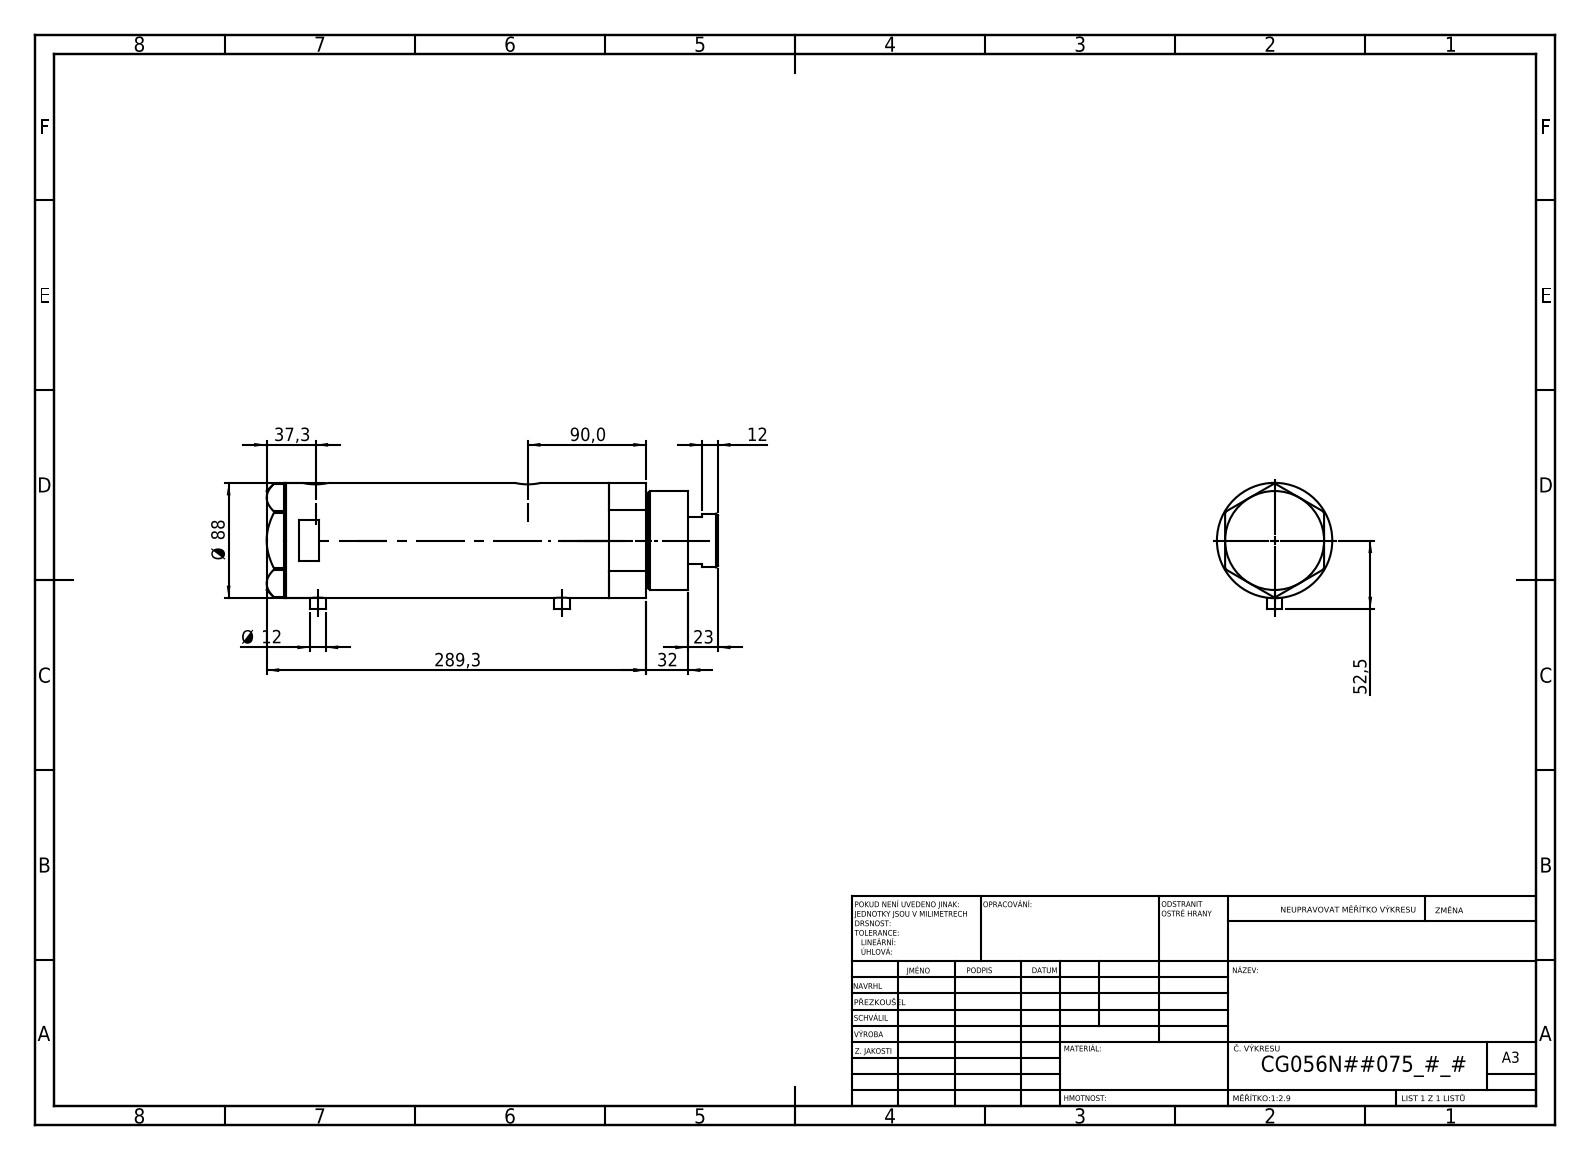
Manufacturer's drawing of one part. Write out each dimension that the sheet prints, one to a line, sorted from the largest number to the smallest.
289,3
90,0
Ø 88
52,5
37,3
32
23
12
Ø 12
